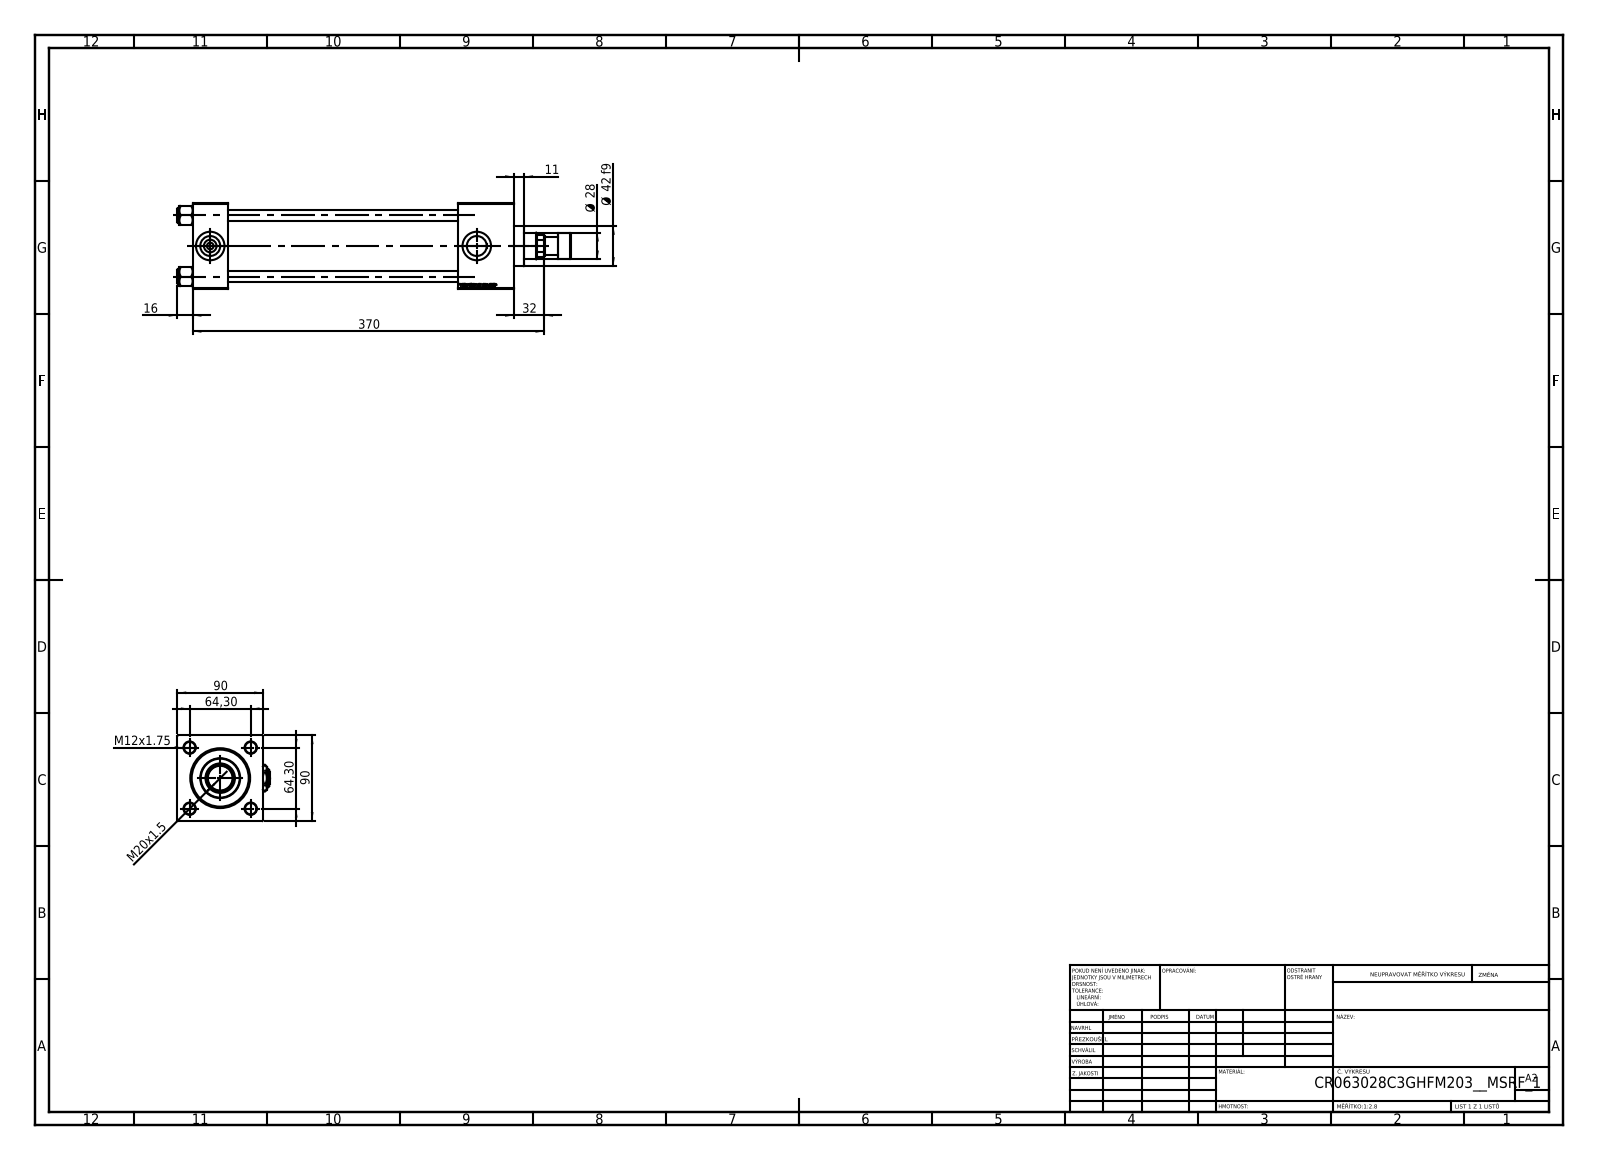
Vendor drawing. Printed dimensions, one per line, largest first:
370
90
90
64,30
64,30
Ø 42 f9
32
Ø 28
M20x1.5
16
M12x1.75
11
